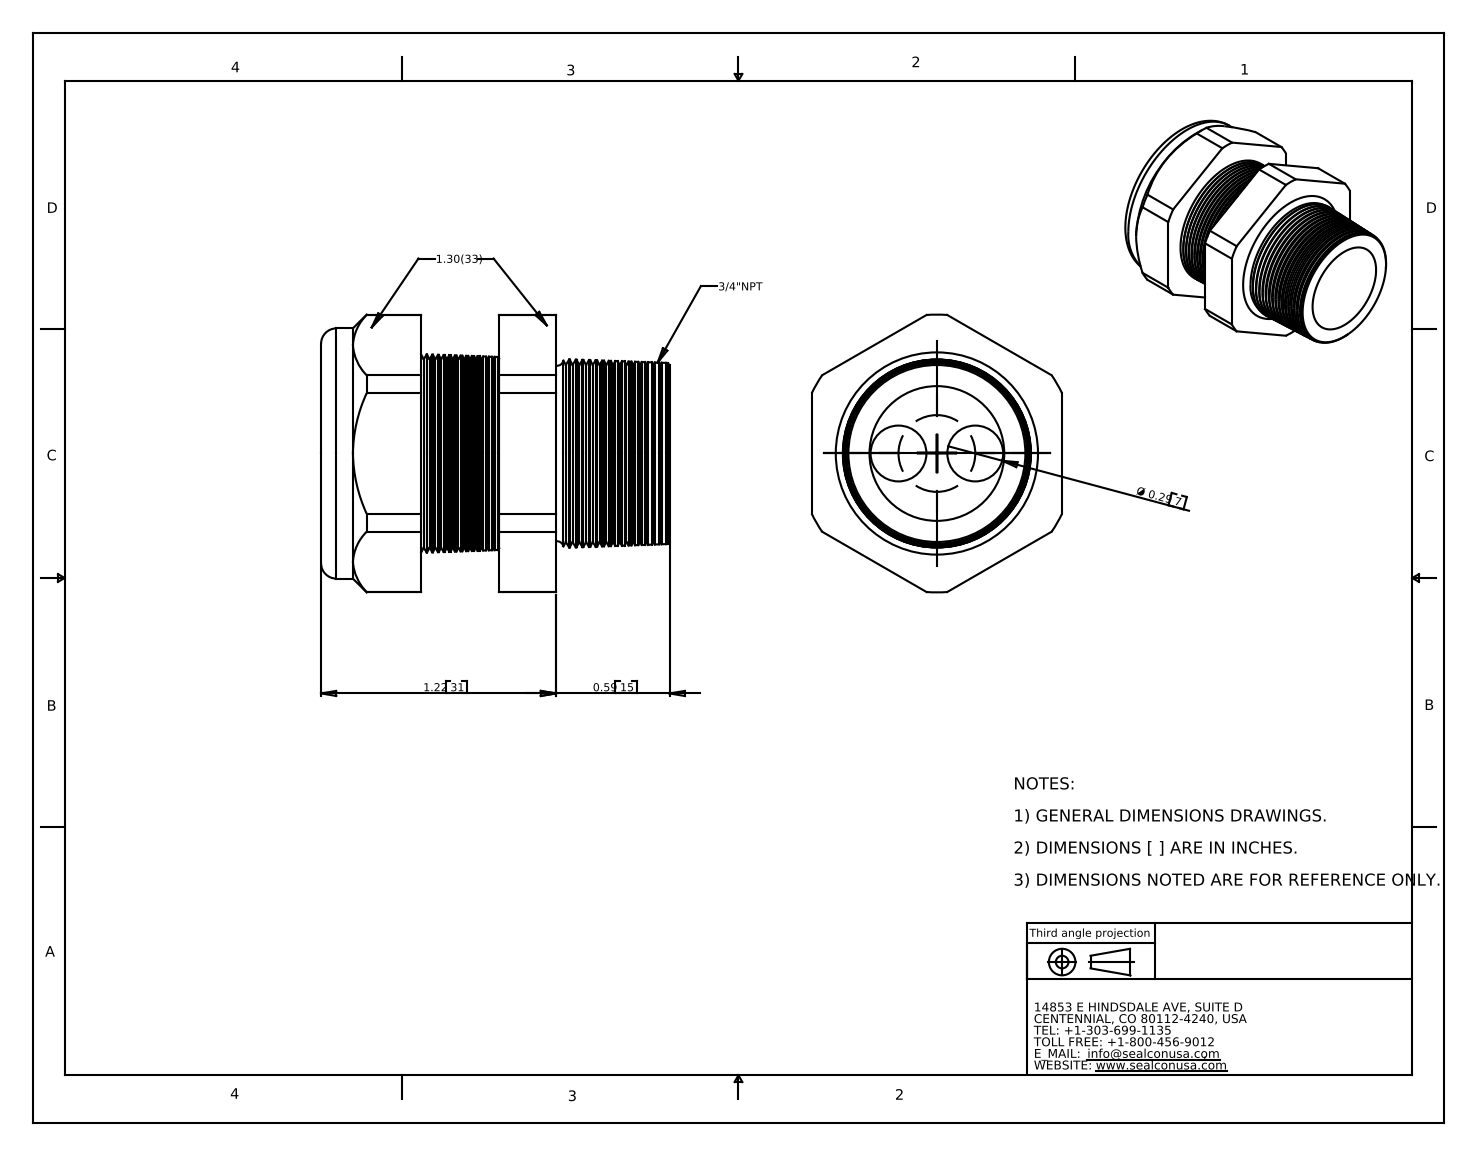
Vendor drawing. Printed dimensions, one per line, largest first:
1.22 31
0.59 15
Ø 0.29 7
